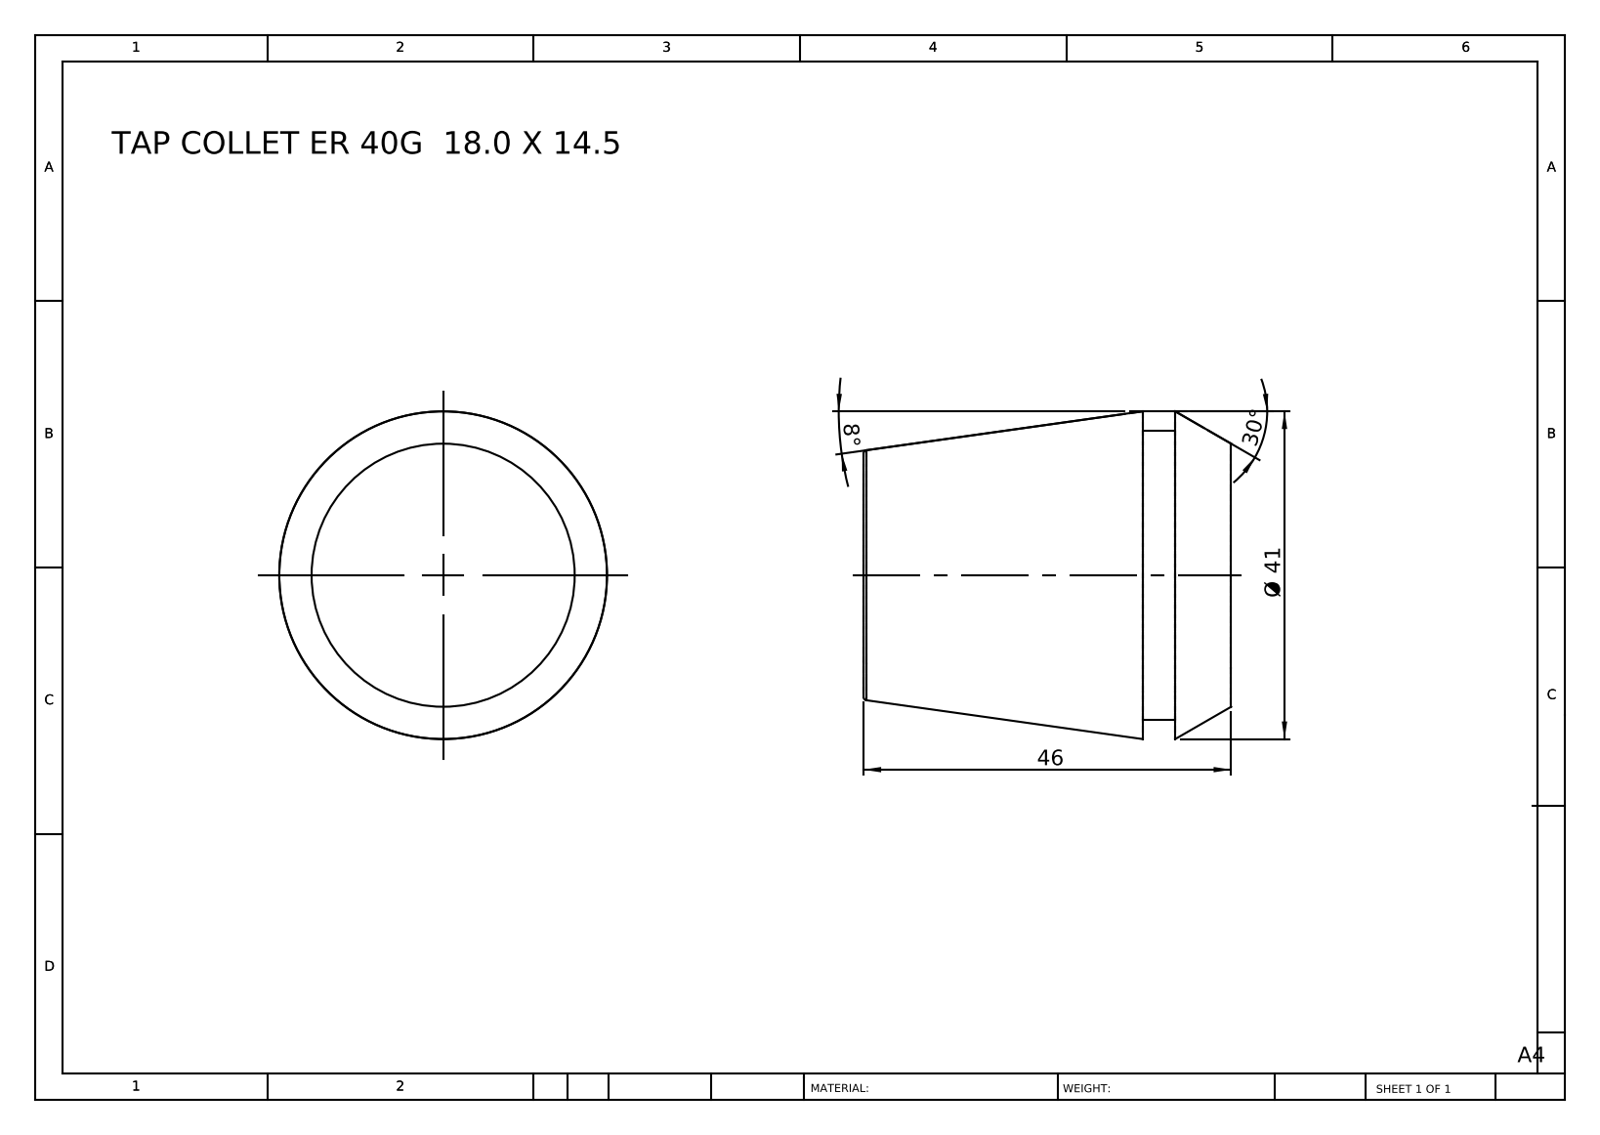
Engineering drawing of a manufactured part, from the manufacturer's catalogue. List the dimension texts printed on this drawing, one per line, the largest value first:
46
Ø 41
30°
8°
